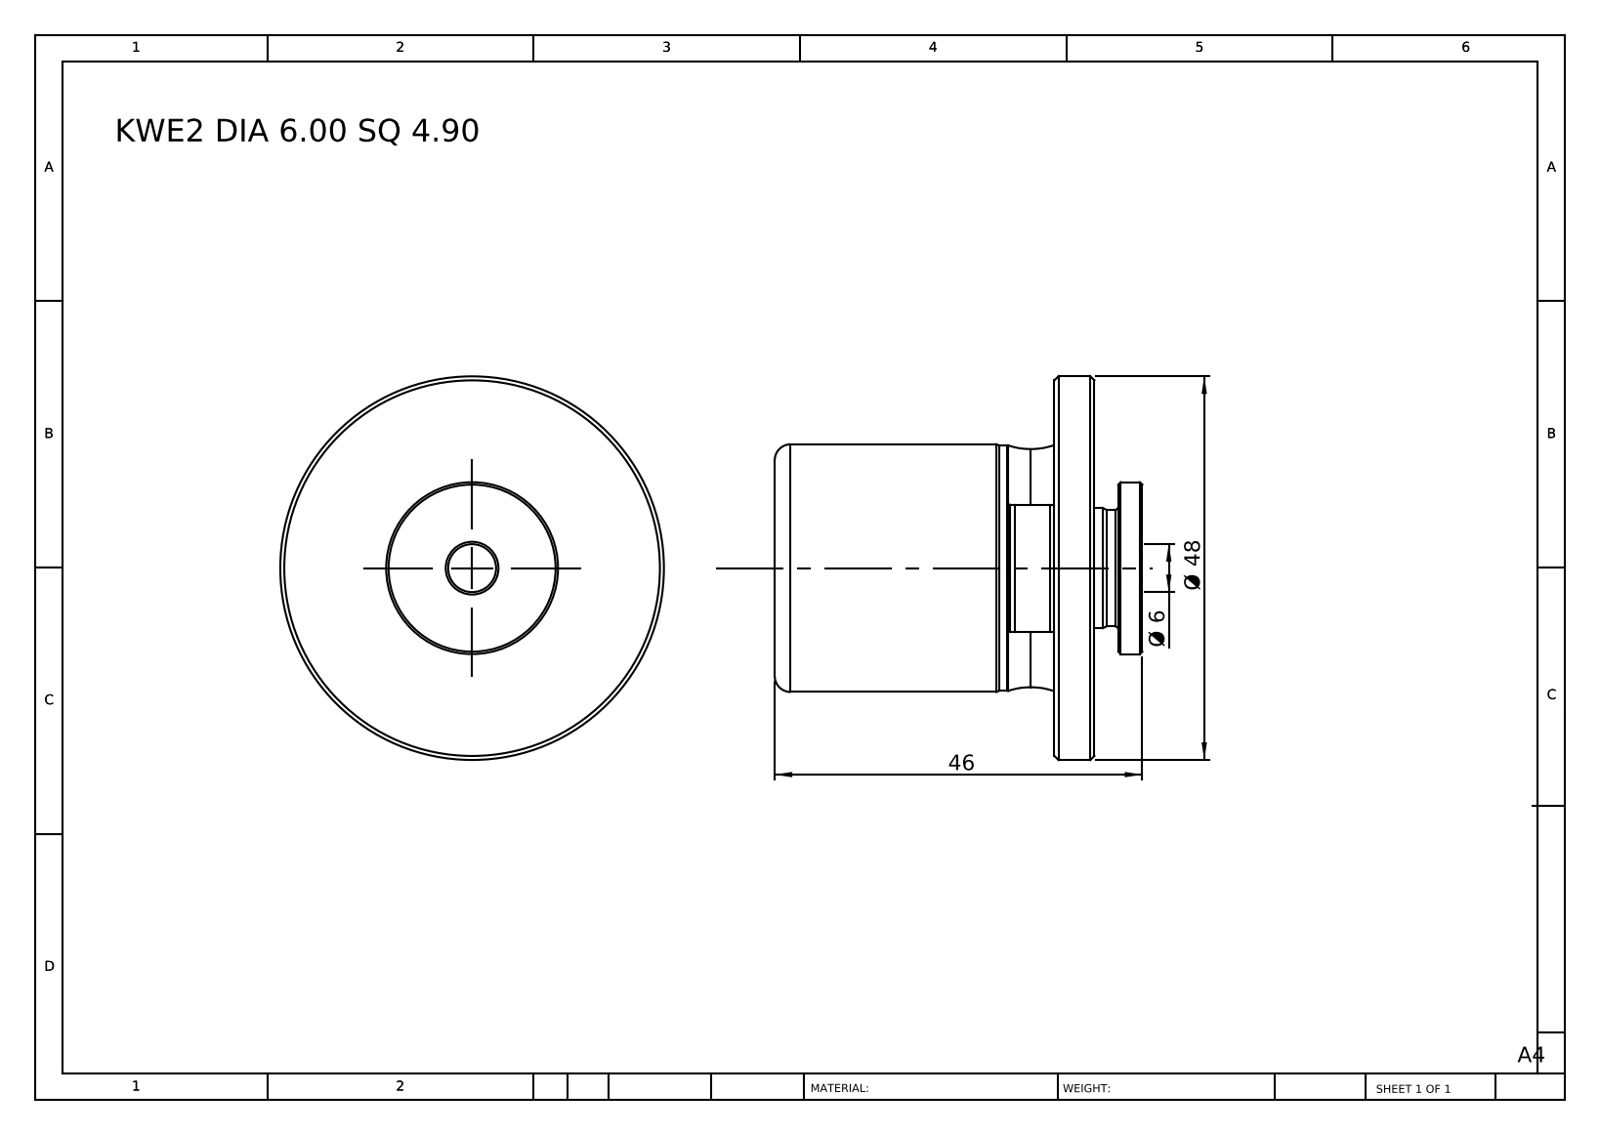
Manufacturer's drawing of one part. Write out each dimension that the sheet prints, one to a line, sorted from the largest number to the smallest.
Ø 48
46
Ø 6
